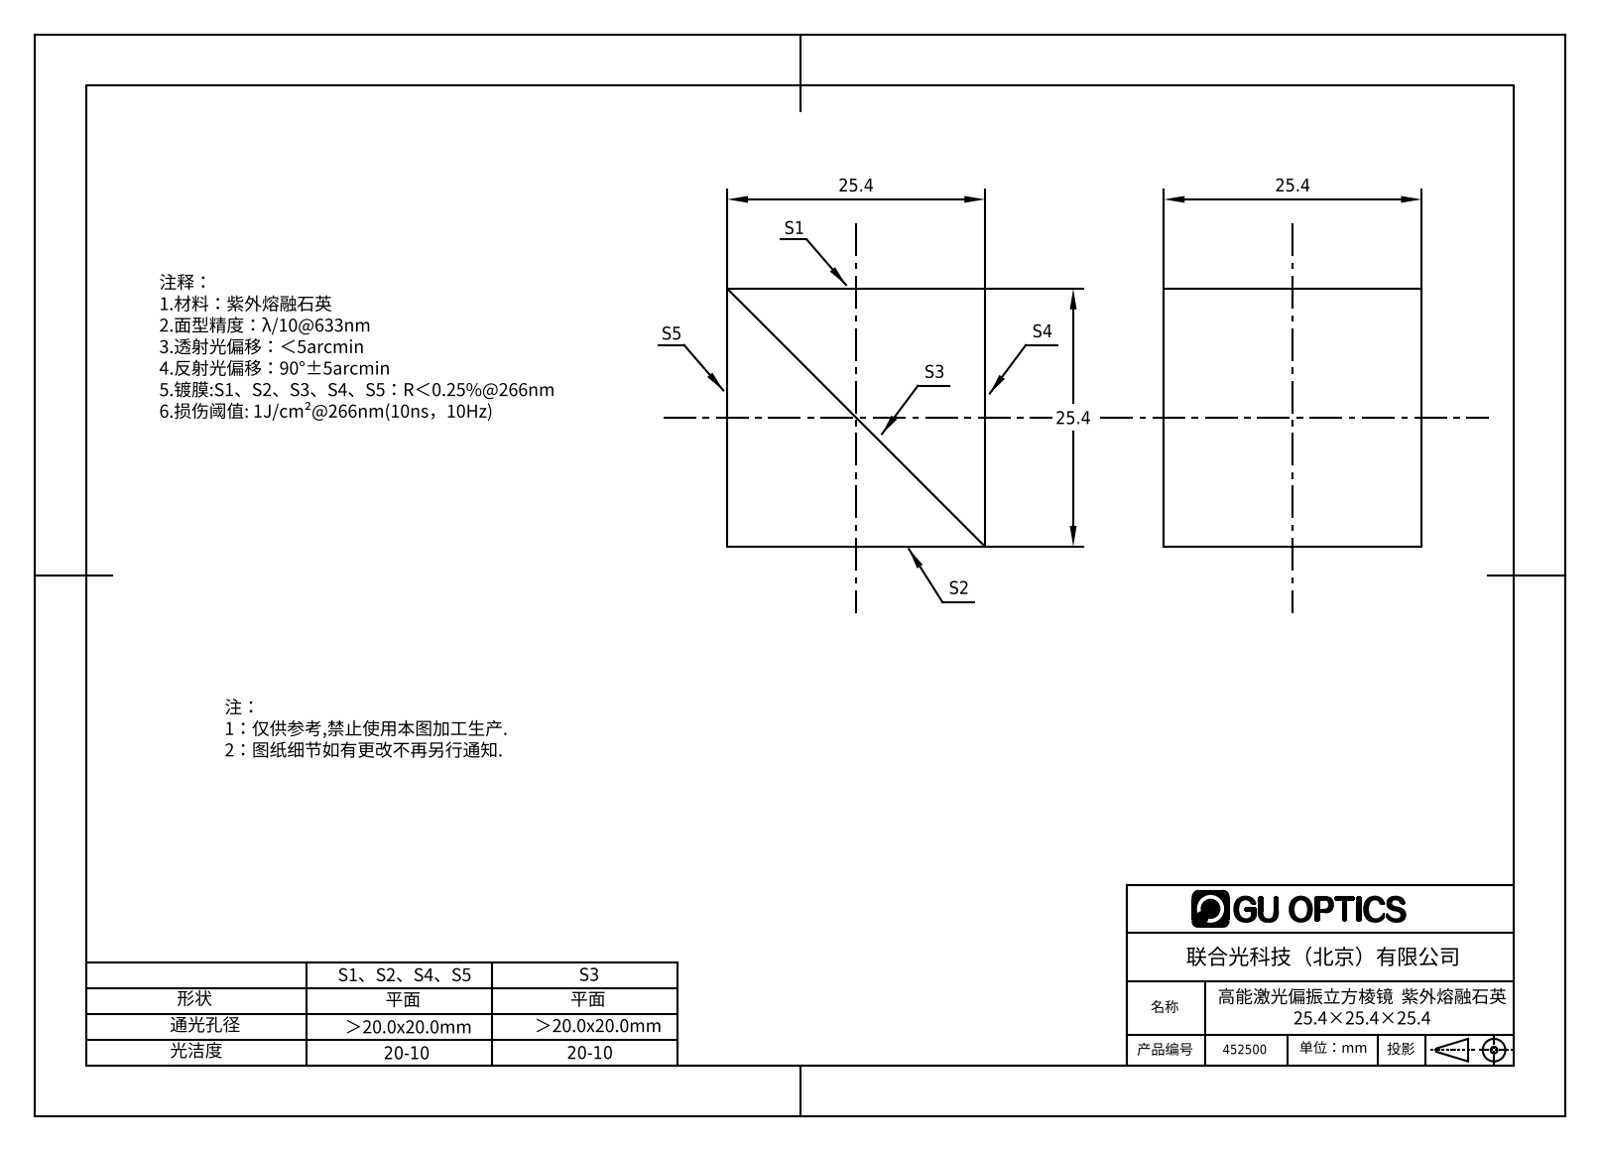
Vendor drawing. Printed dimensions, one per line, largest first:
25.4
25.4
25.4
